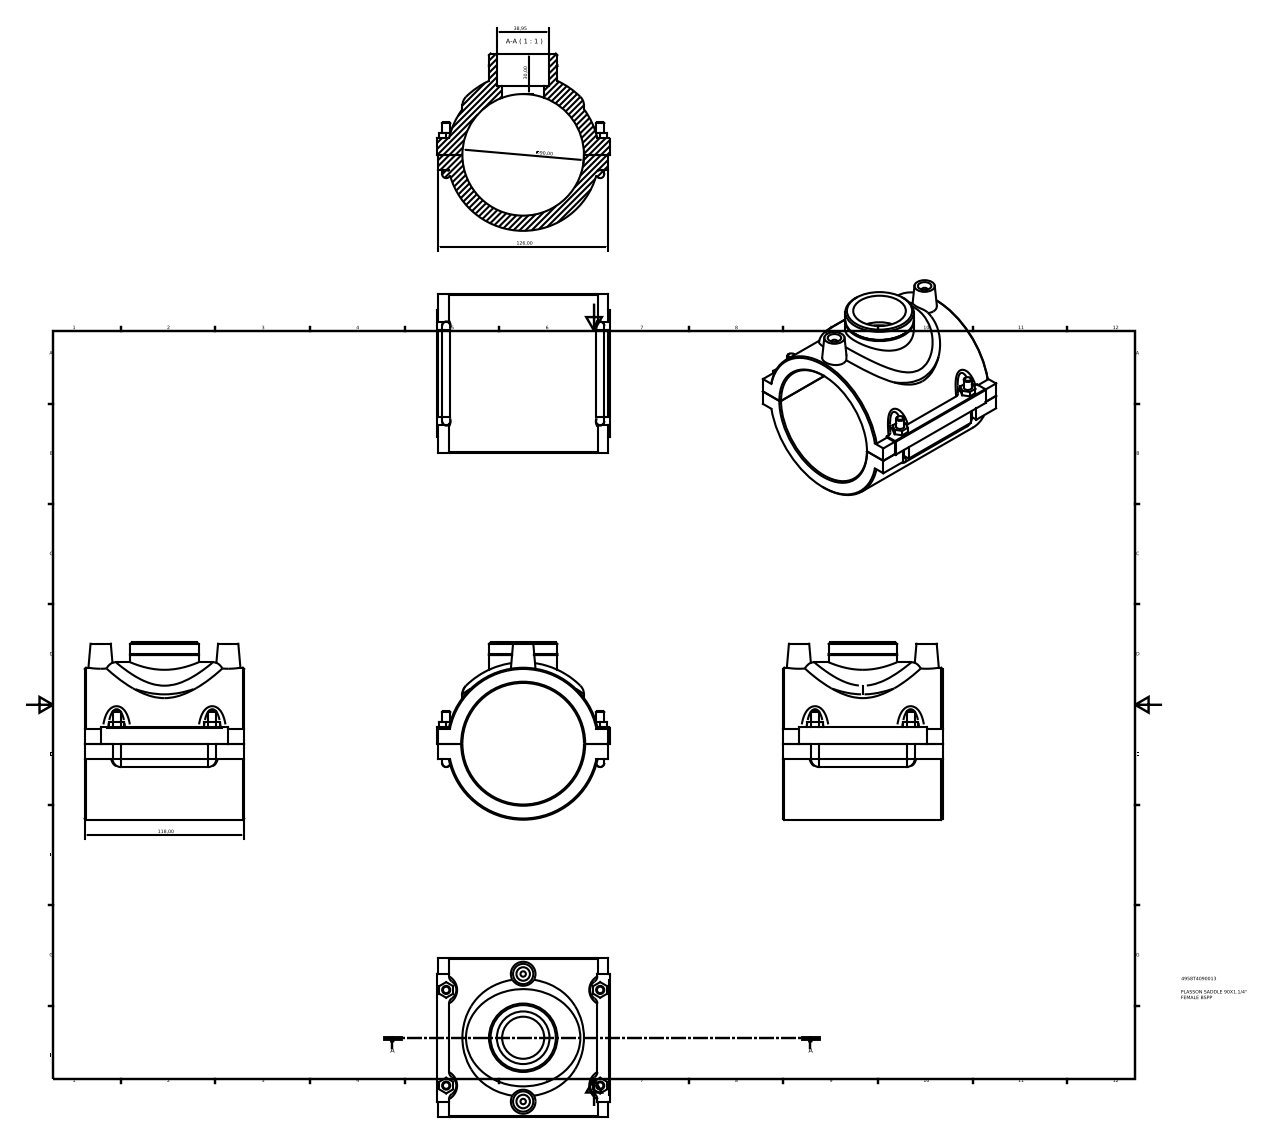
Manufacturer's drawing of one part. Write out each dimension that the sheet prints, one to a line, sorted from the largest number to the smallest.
126,00
118,00
∅90,00
38,95
30,00
